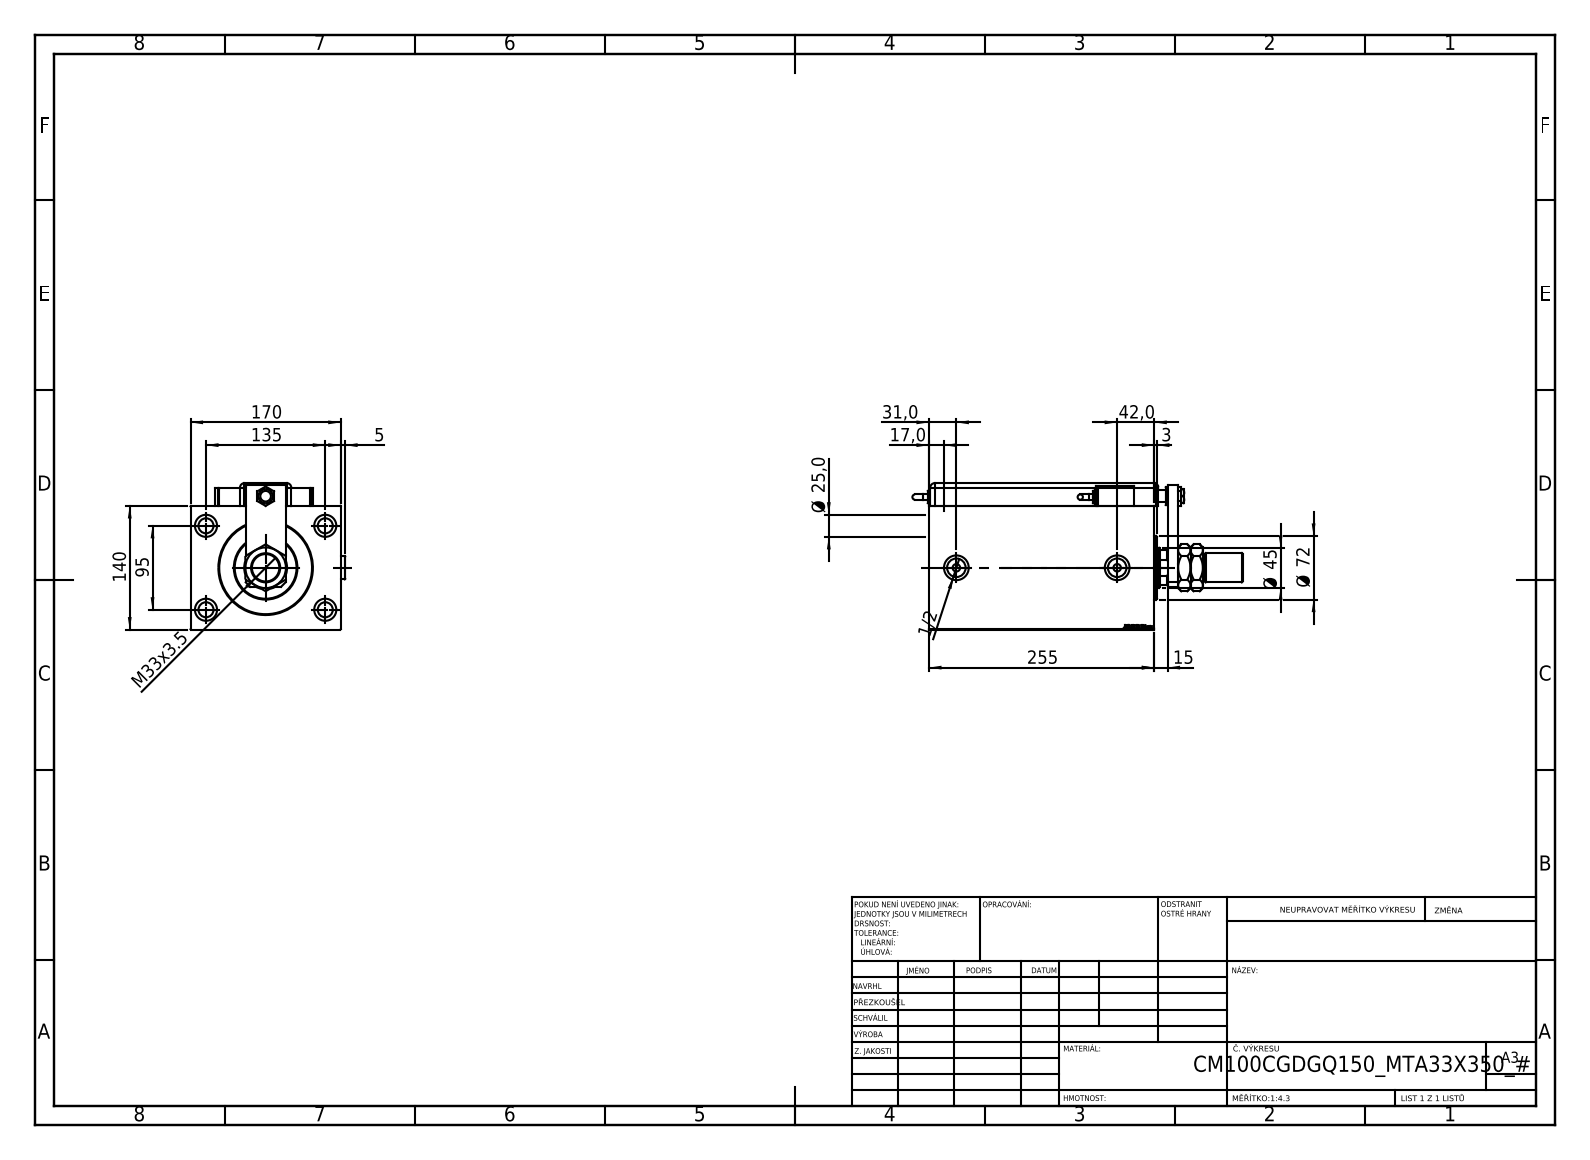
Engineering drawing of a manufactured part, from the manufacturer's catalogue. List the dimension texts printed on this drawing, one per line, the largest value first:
255
170
140
135
95
Ø 72
Ø 45
42,0
M33x3.5
31,0
Ø 25,0
17,0
15
5
3
1/2
